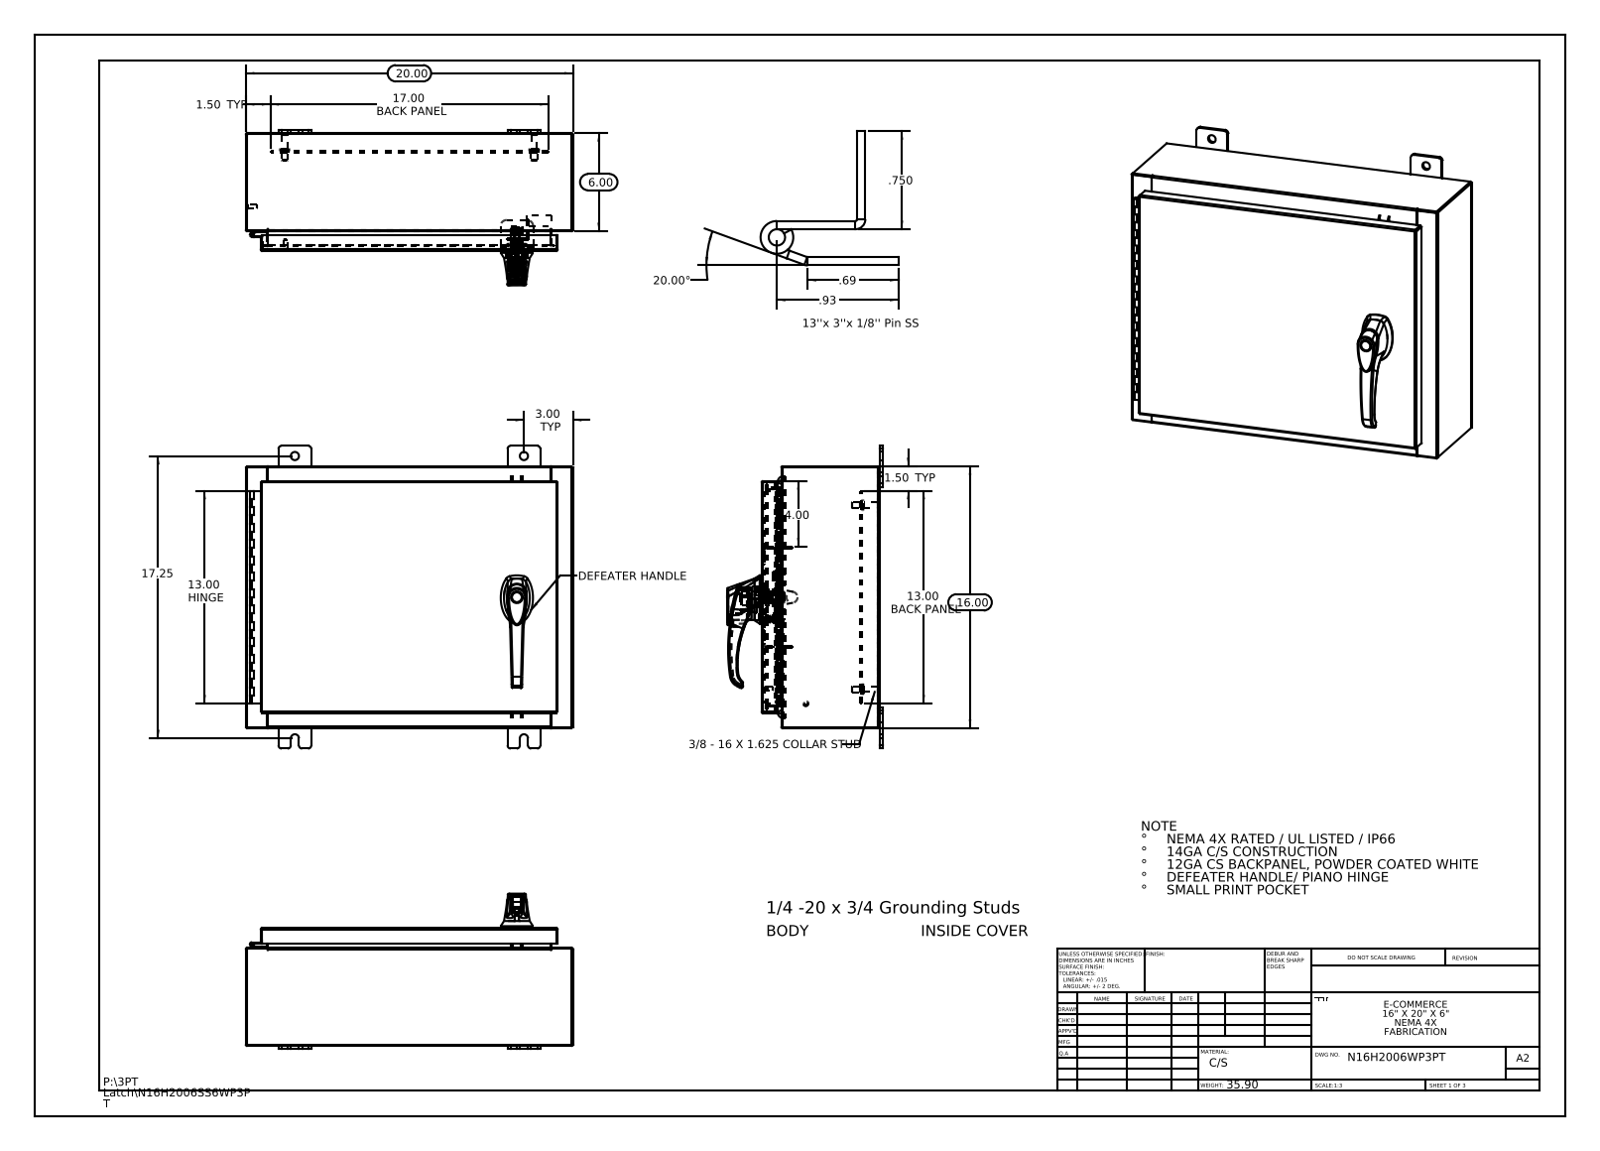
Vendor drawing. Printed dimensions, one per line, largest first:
20.00
20.00°
17.25
17.00 BACK PANEL
16.00
13.00 HINGE
13.00 BACK PANEL
6.00
4.00
3.00 TYP
1.50 TYP
1.50 TYP
.93
.750
.69
